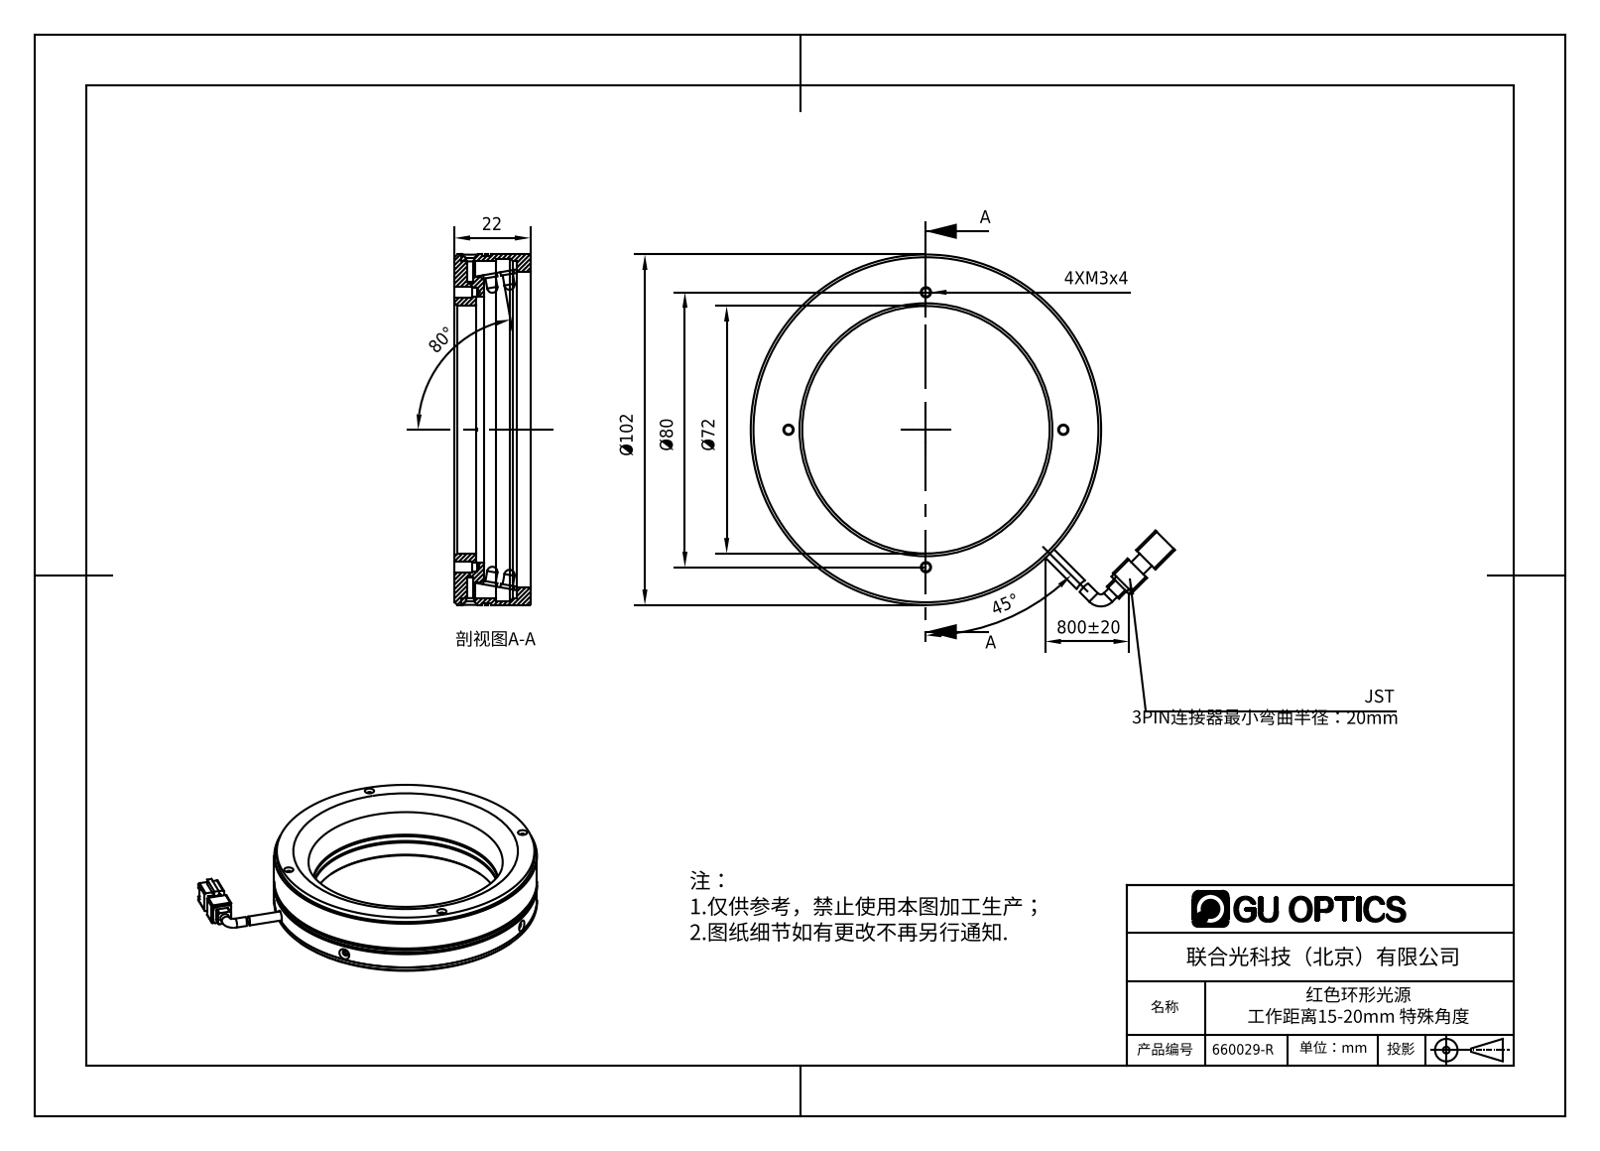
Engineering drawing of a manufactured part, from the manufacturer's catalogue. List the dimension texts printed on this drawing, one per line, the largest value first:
800±20
Ø102
Ø80
80°
Ø72
45°
22
4XM3x4
